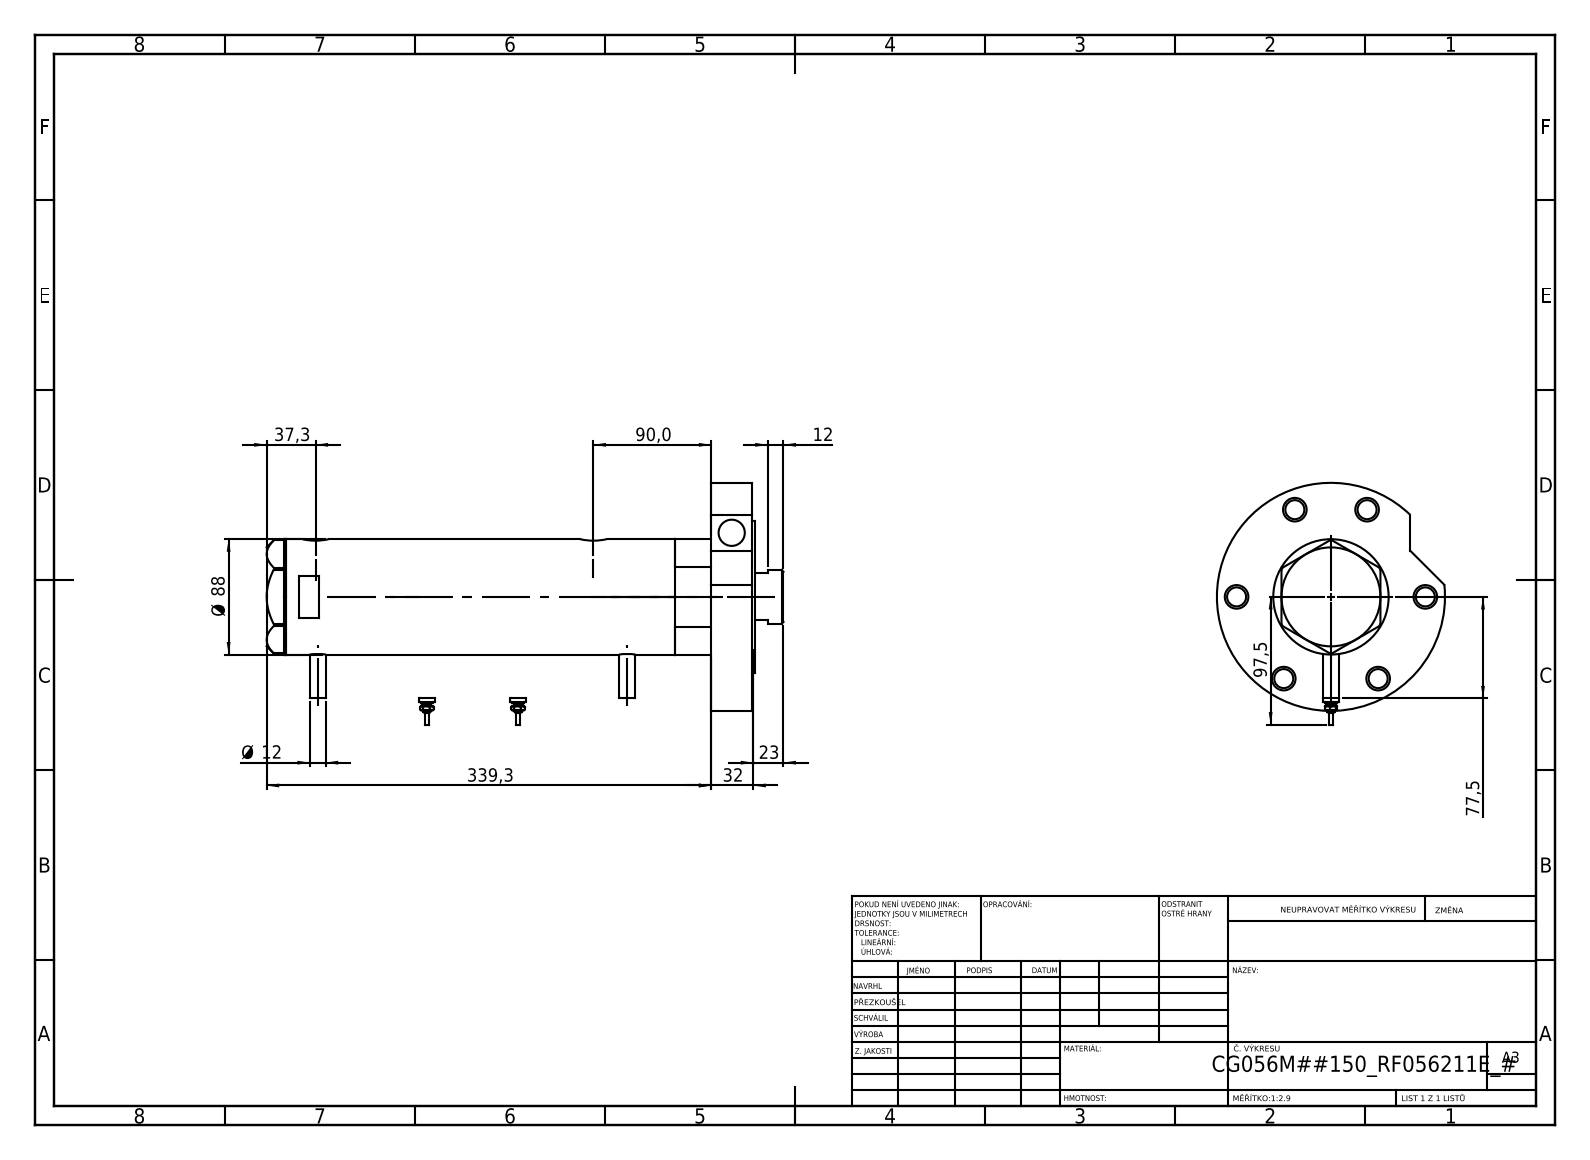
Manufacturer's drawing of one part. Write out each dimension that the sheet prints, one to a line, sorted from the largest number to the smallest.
339,3
97,5
90,0
Ø 88
77,5
37,3
32
23
12
Ø 12
